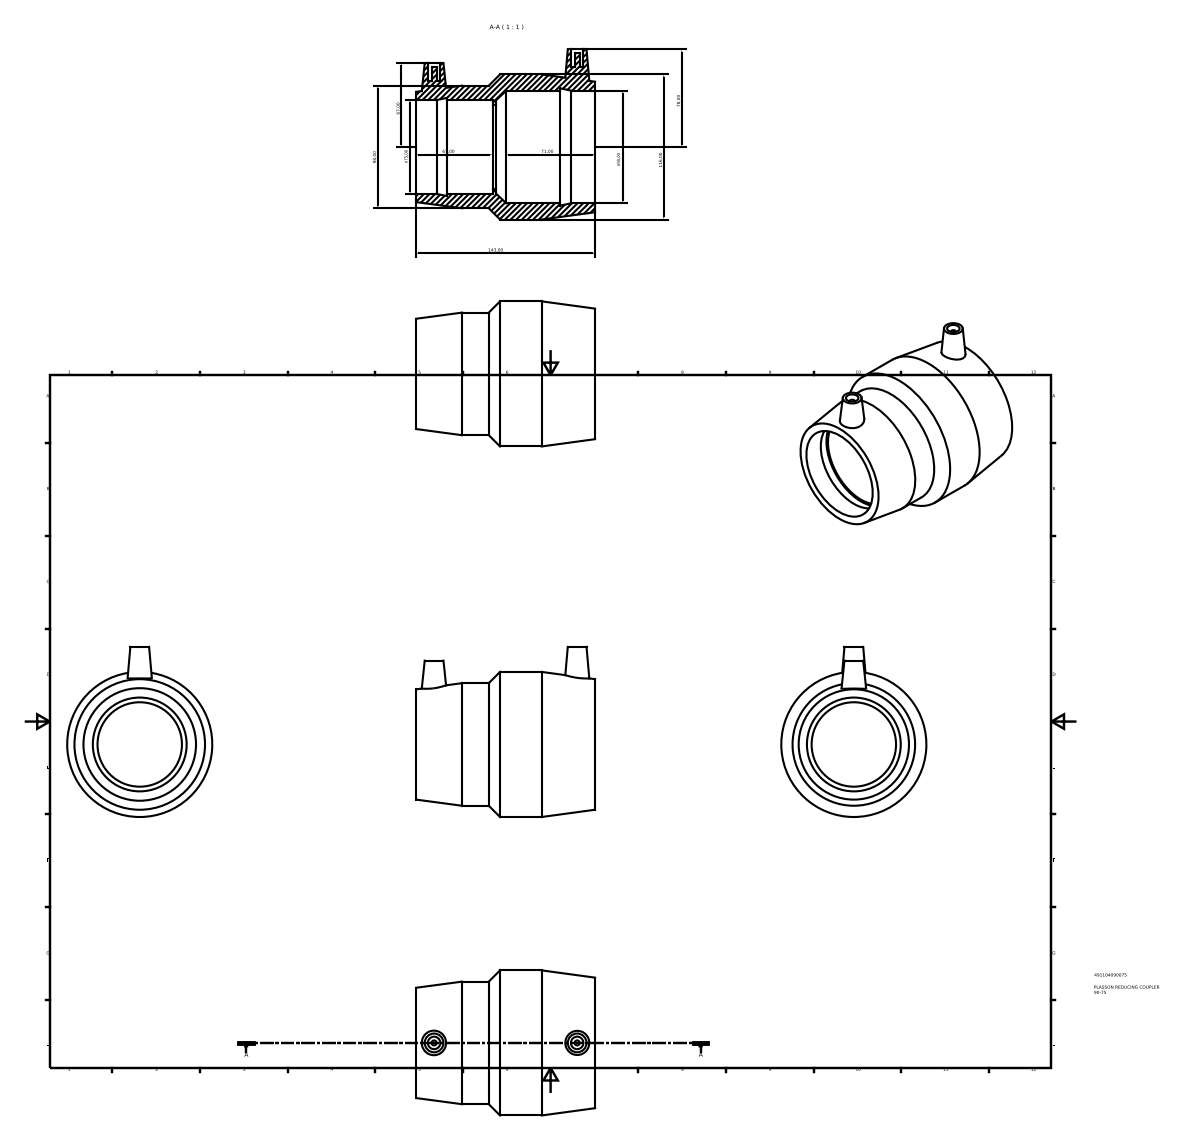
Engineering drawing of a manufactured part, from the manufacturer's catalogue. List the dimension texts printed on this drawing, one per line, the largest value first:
143,00
116,00
98,00
n90,00
78,00
n75,00
71,00
67,00
61,00
